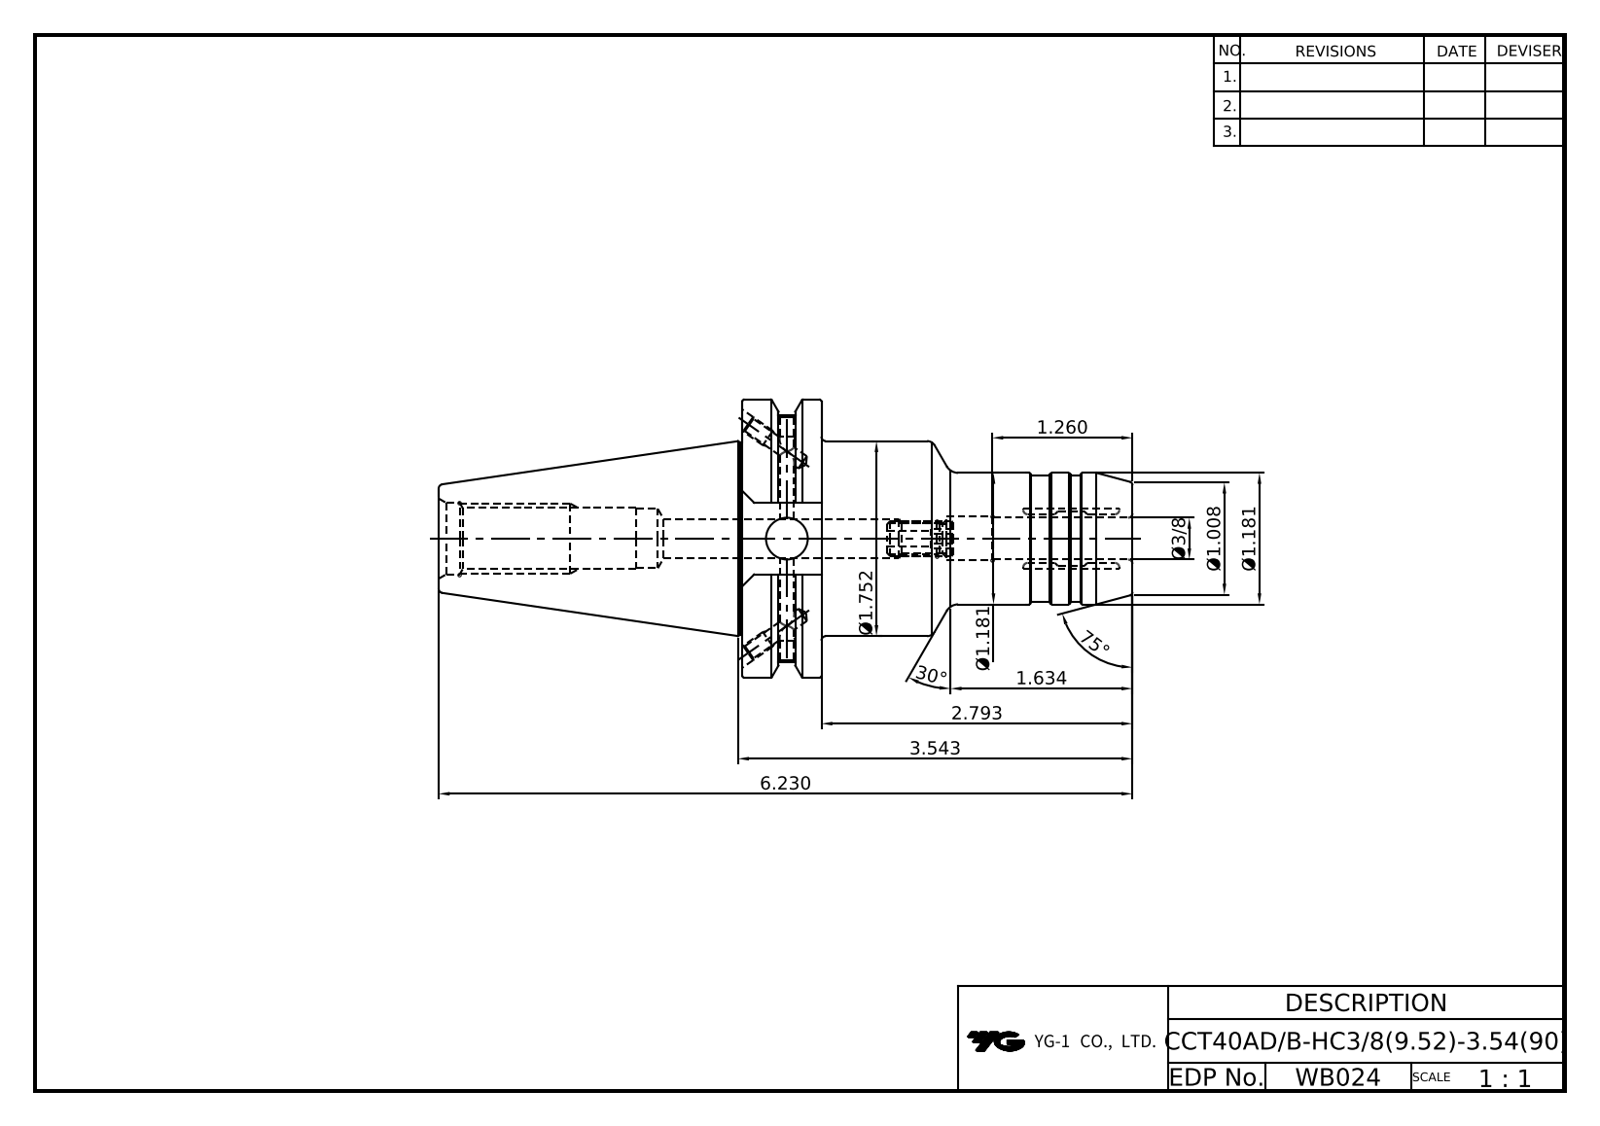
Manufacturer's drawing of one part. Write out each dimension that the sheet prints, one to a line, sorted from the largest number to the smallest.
75°
30°
6.230
3.543
2.793
Ø1.752
1.634
1.260
Ø1.181
Ø1.181
Ø1.008
Ø3/8
